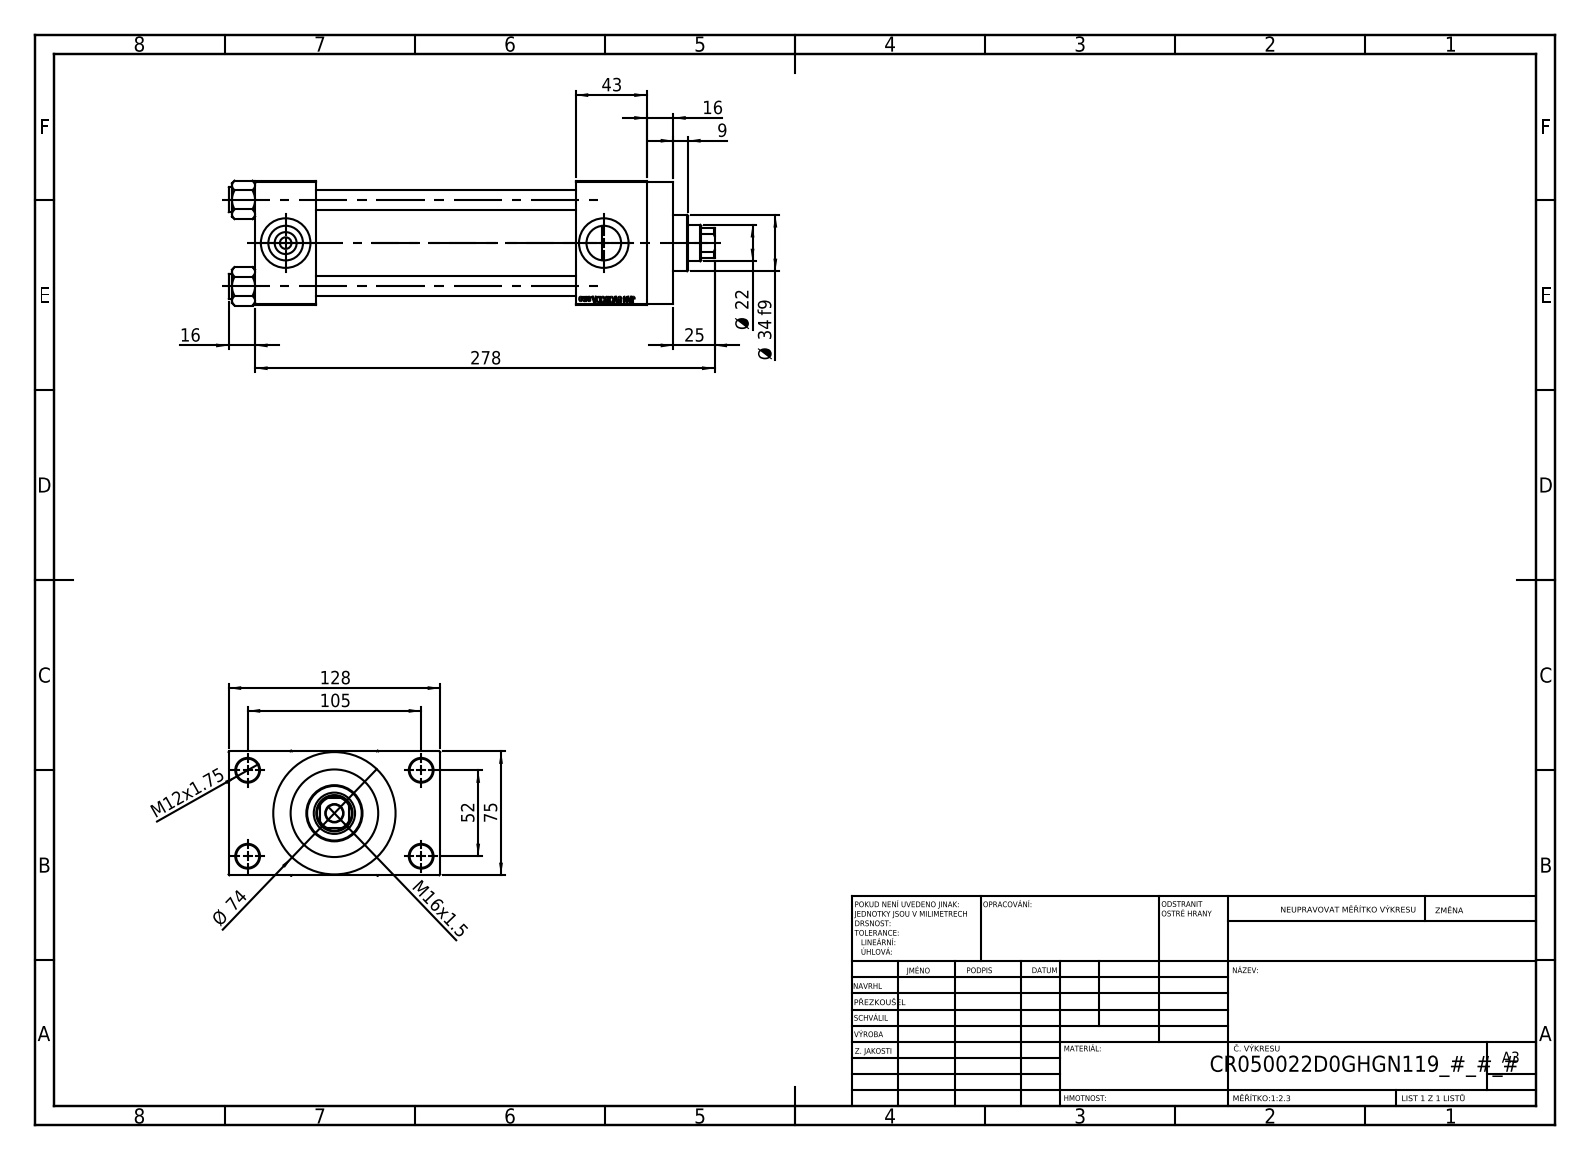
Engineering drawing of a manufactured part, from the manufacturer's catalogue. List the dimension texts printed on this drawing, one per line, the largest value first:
278
128
105
75
Ø 74
52
43
Ø 34 f9
25
Ø 22
16
16
M16x1.5
M12x1.75
9
